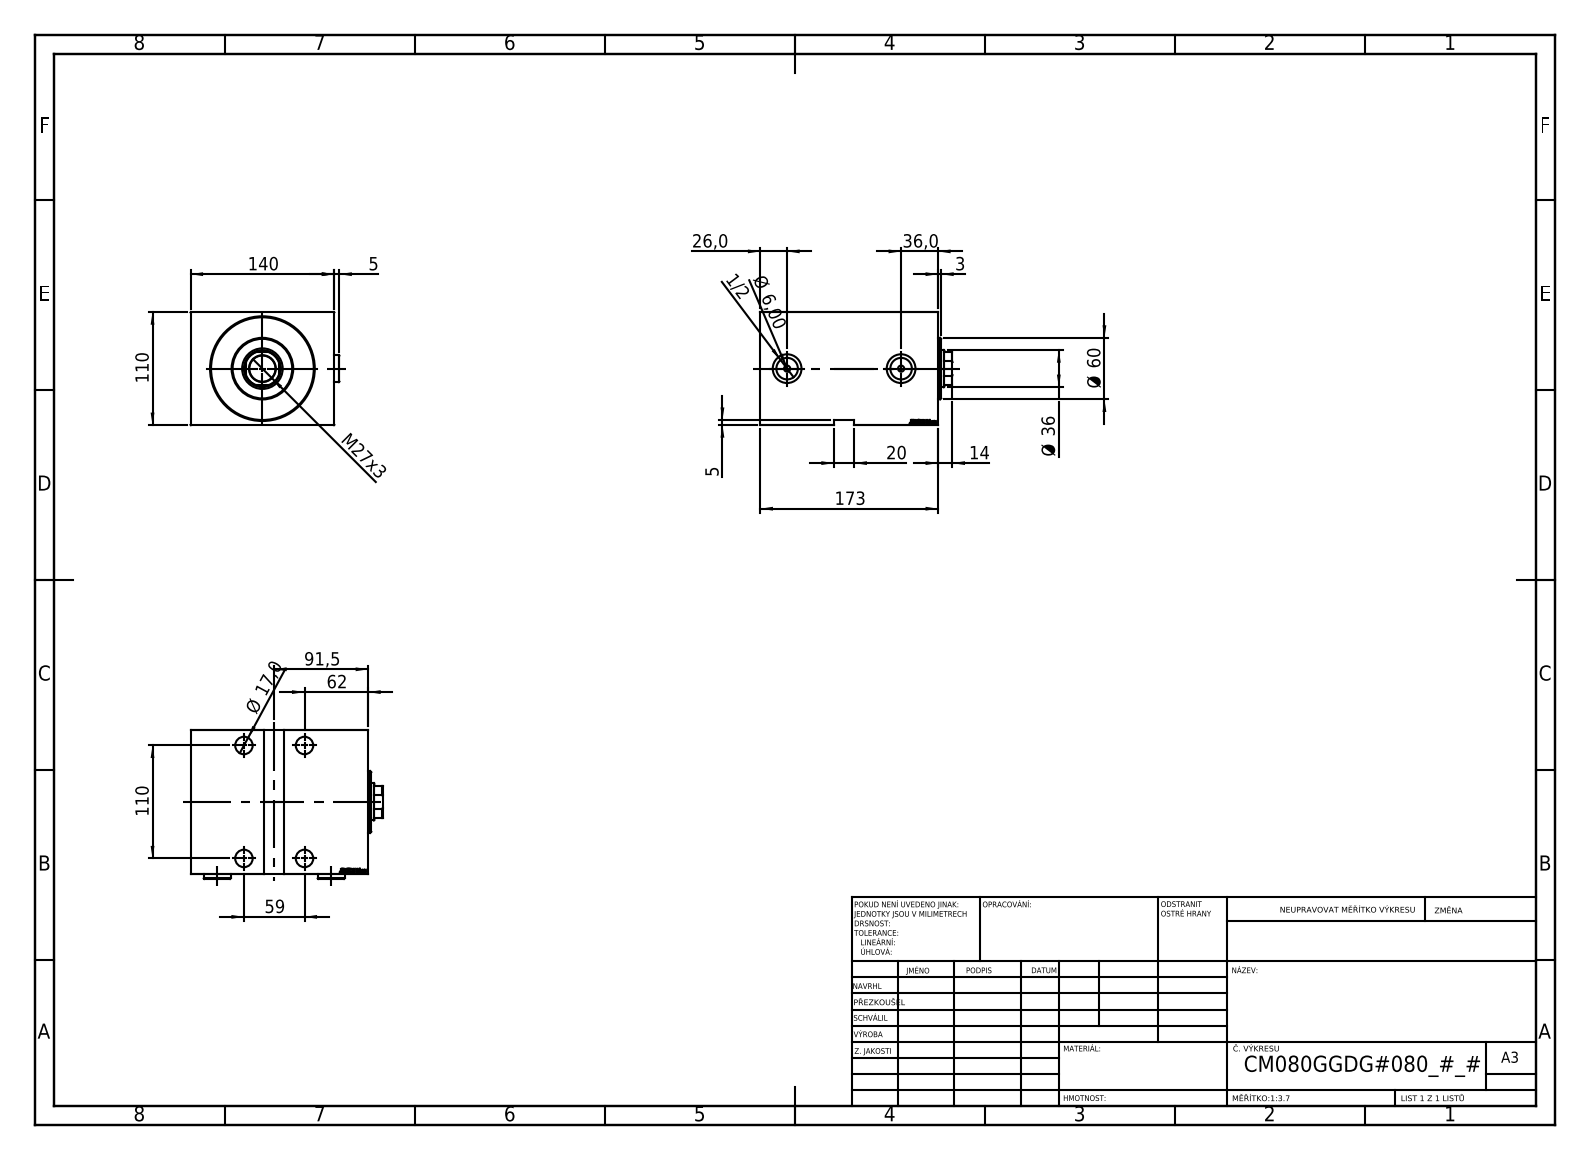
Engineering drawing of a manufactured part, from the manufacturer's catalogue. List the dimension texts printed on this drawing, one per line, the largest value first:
173
140
110
110
91,5
62
Ø 60
59
Ø 36
36,0
M27x3
26,0
20
Ø 17,0
14
Ø 6,00
5
5
3
1/2
